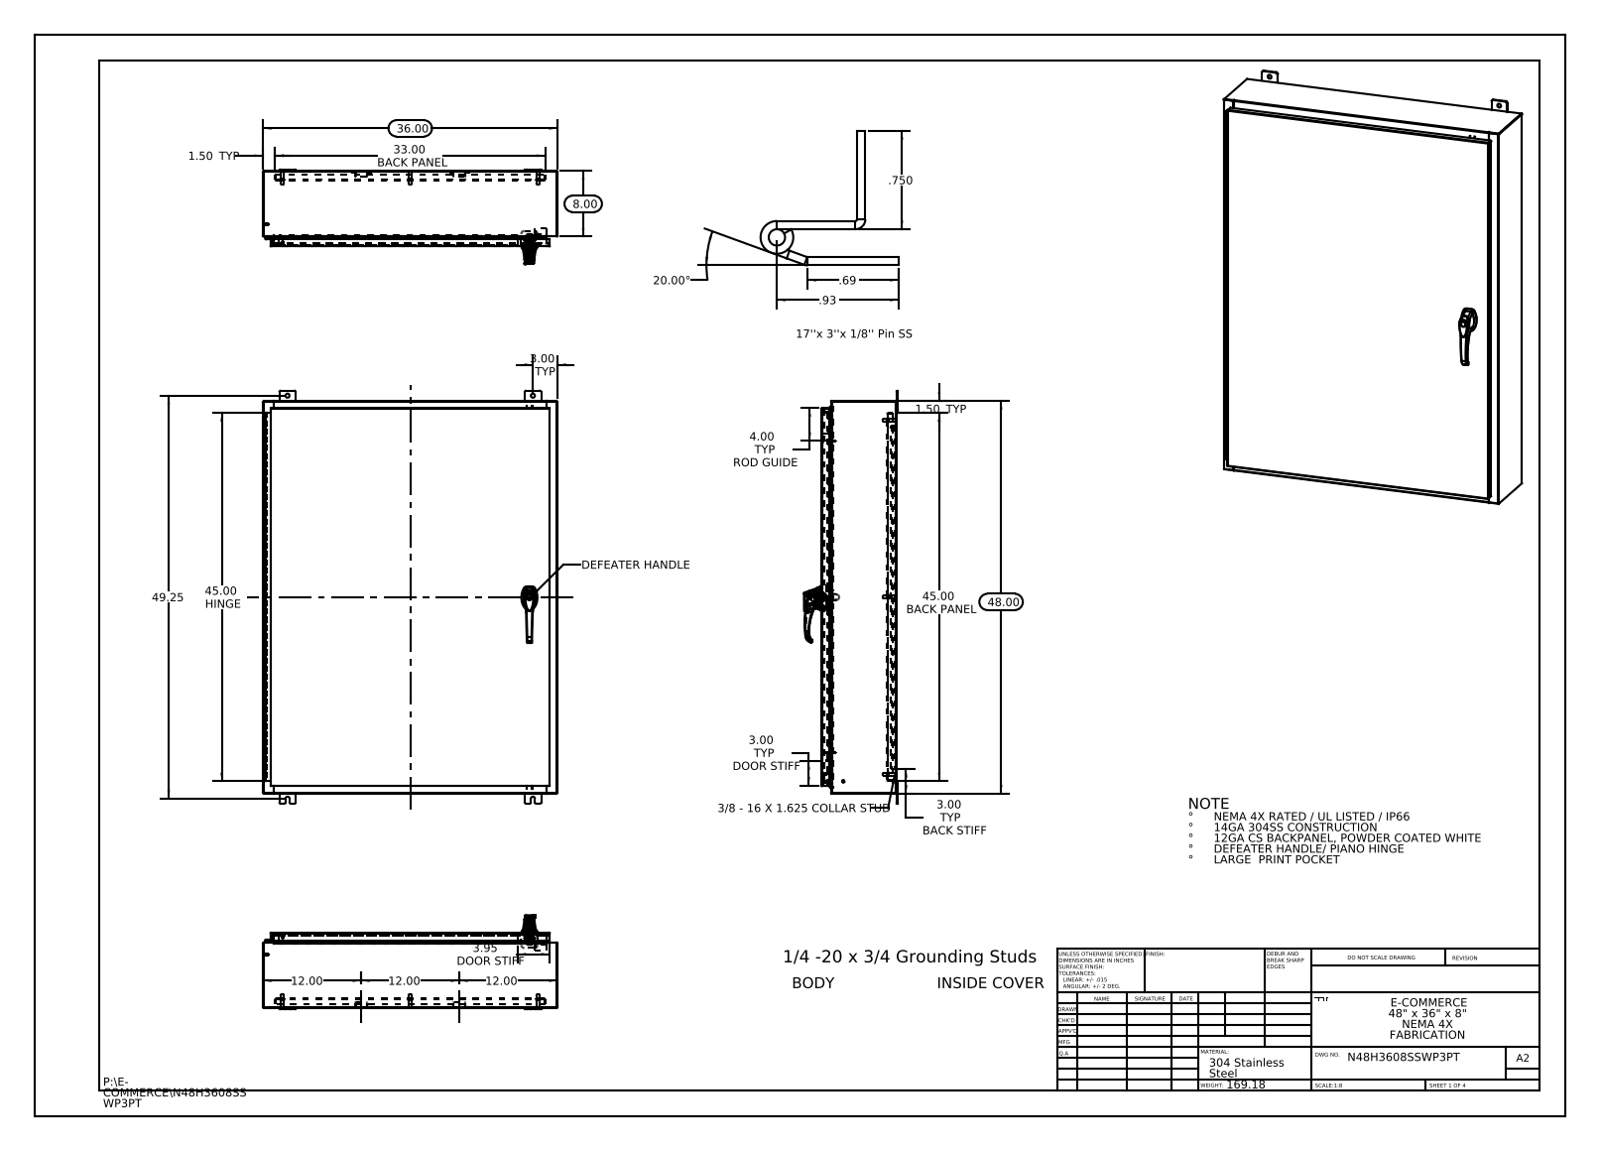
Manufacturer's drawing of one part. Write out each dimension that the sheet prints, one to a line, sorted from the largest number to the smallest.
49.25
48.00
45.00 HINGE
45.00 BACK PANEL
36.00
33.00 BACK PANEL
20.00°
12.00
12.00
12.00
8.00
4.00 TYP ROD GUIDE
3.95 DOOR STIFF
3.00 TYP
3.00 TYP BACK STIFF
3.00 TYP DOOR STIFF
1.50 TYP
1.50 TYP
.93
.750
.69
